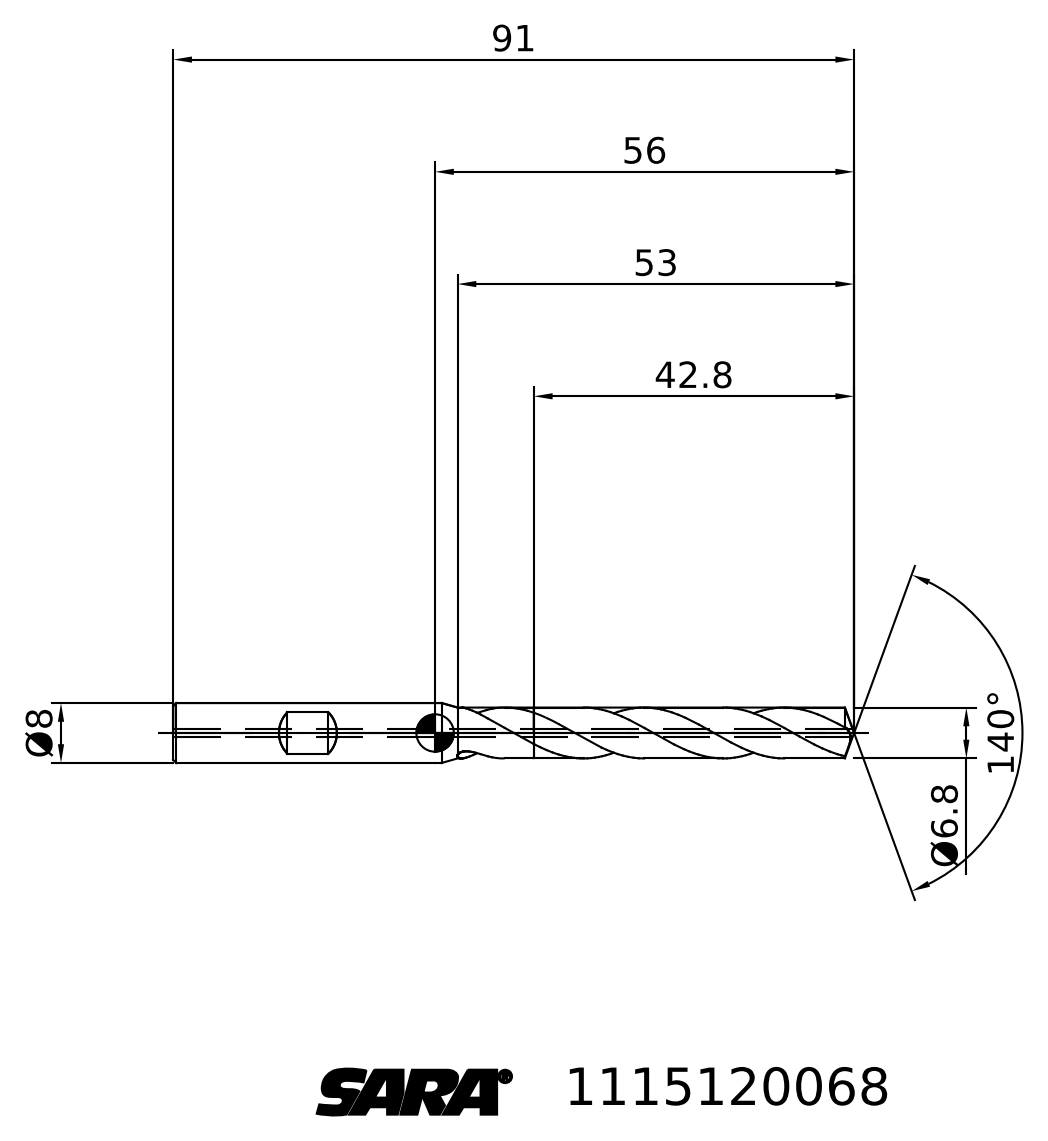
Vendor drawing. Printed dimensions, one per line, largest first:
140°
91
56
53
42.8
Ø8
Ø6.8
